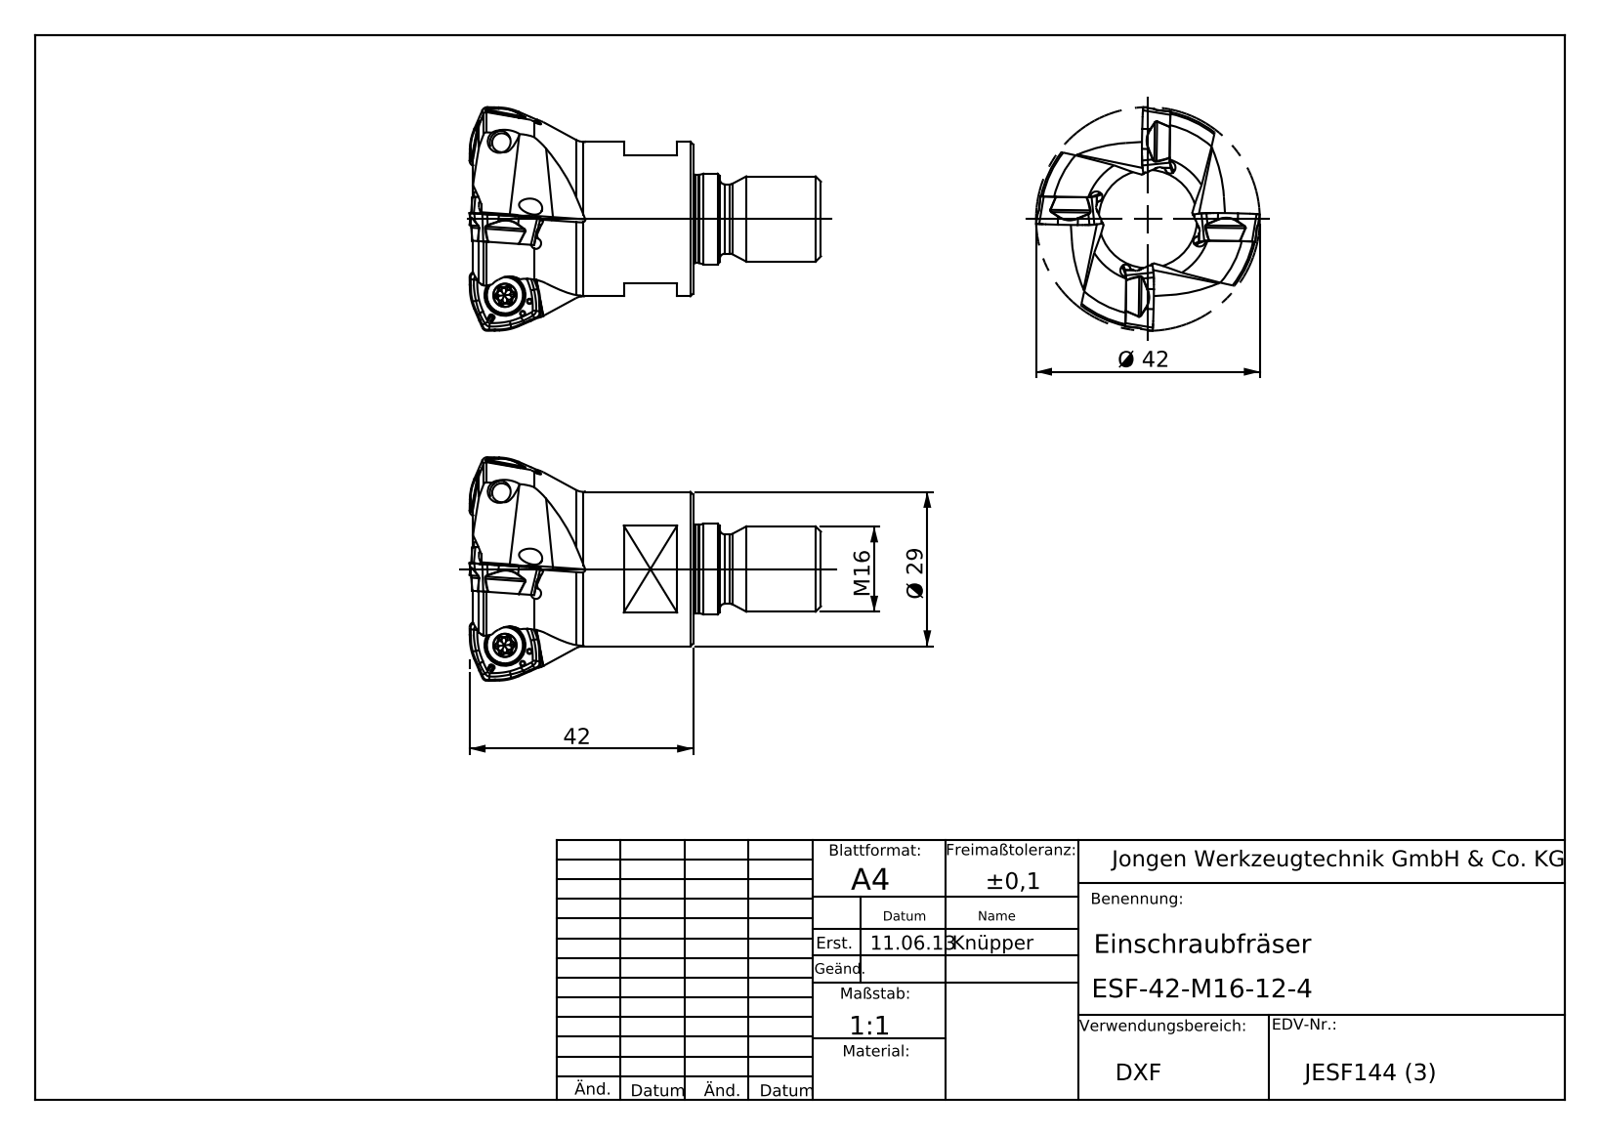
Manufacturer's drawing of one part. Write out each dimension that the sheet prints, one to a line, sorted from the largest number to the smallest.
Ø 42
42
Ø 29
M 16
